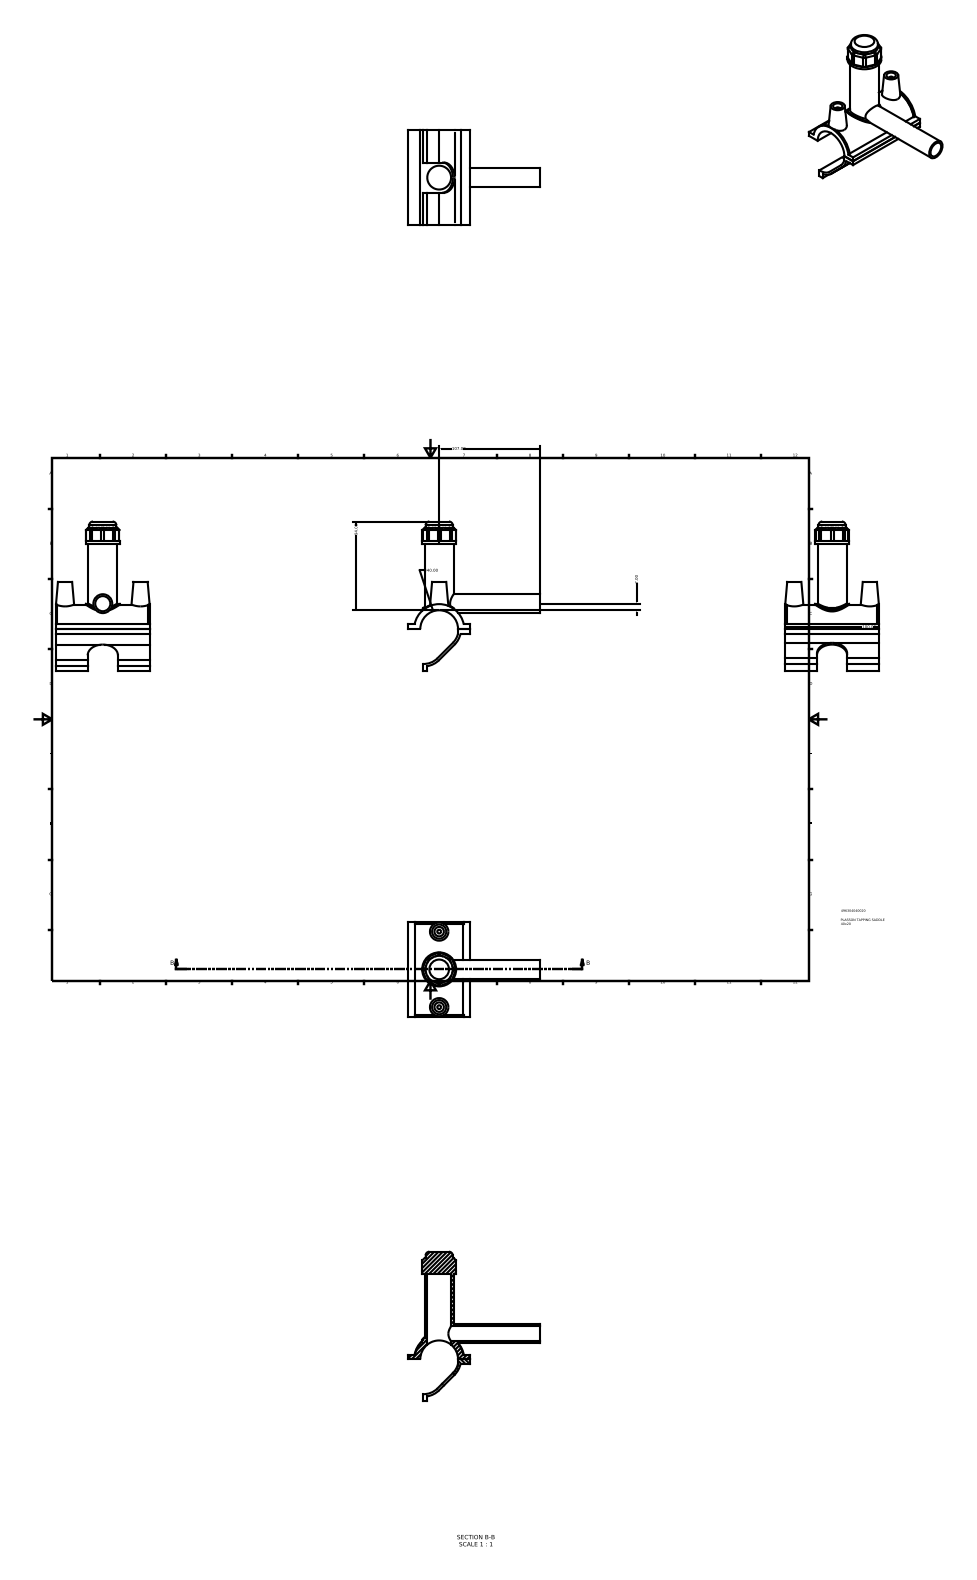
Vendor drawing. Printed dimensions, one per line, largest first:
107.00
100.00
94.00
∅40.00
7.00
